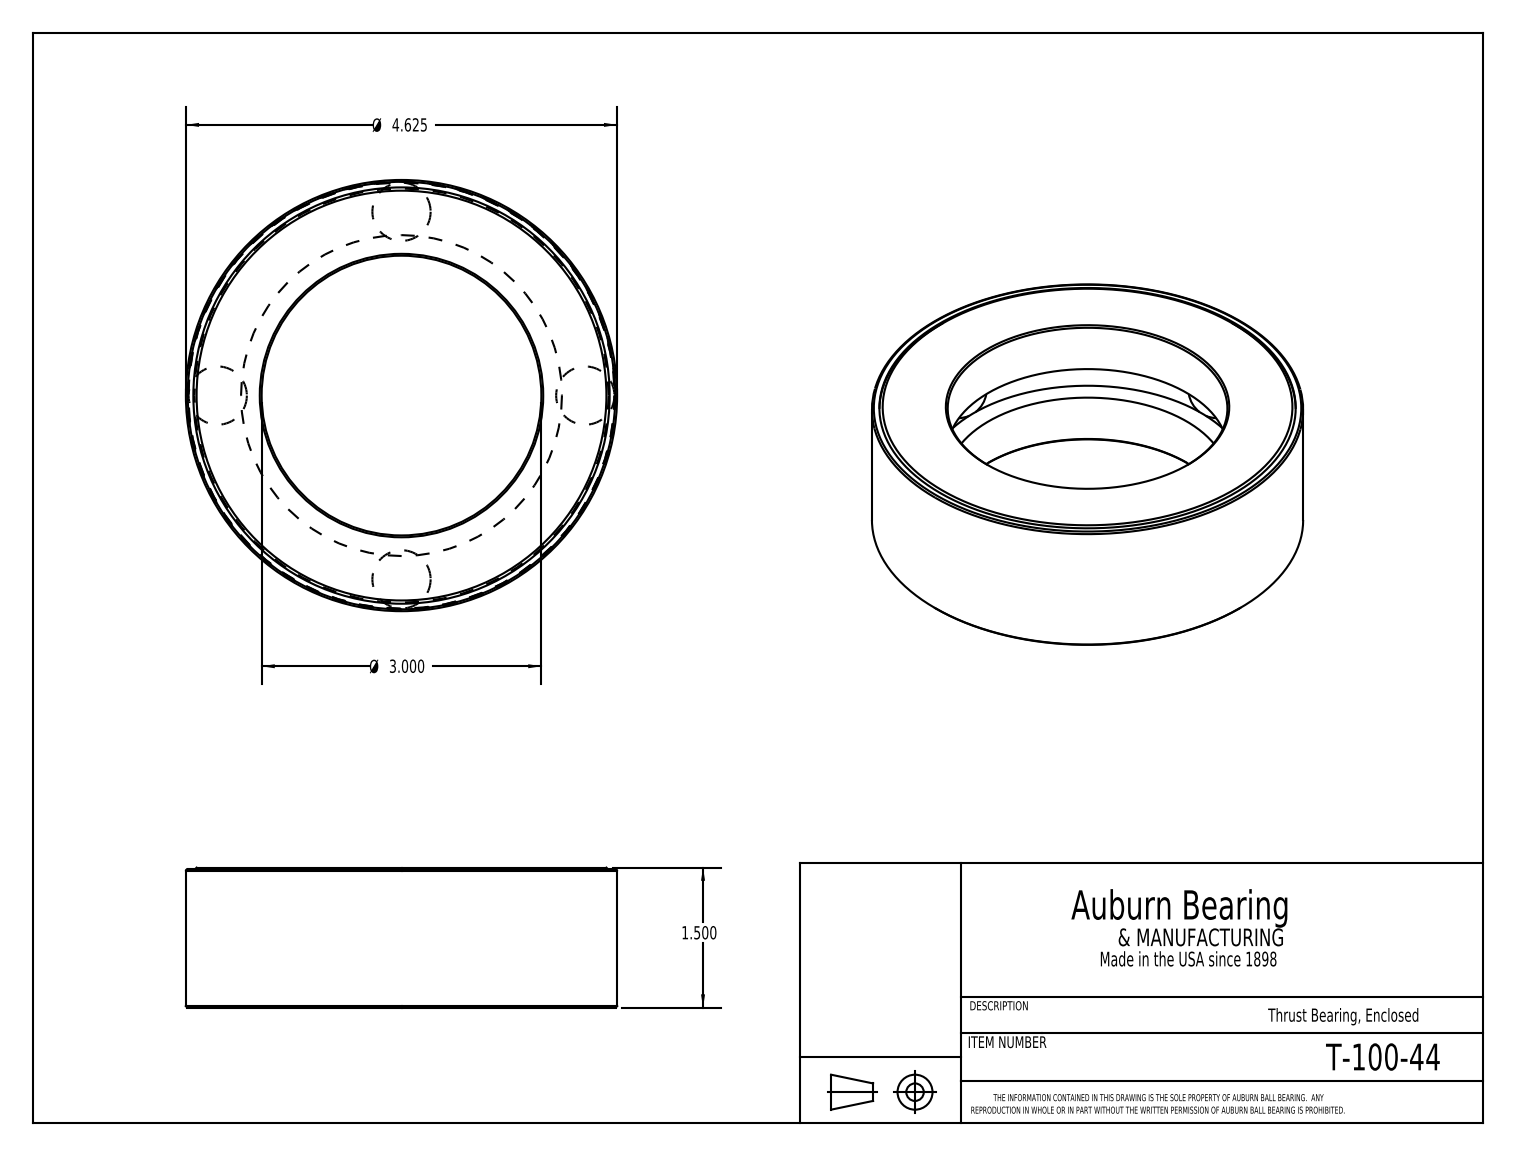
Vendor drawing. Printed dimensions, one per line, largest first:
Ø 4.625
Ø 3.000
1.500
